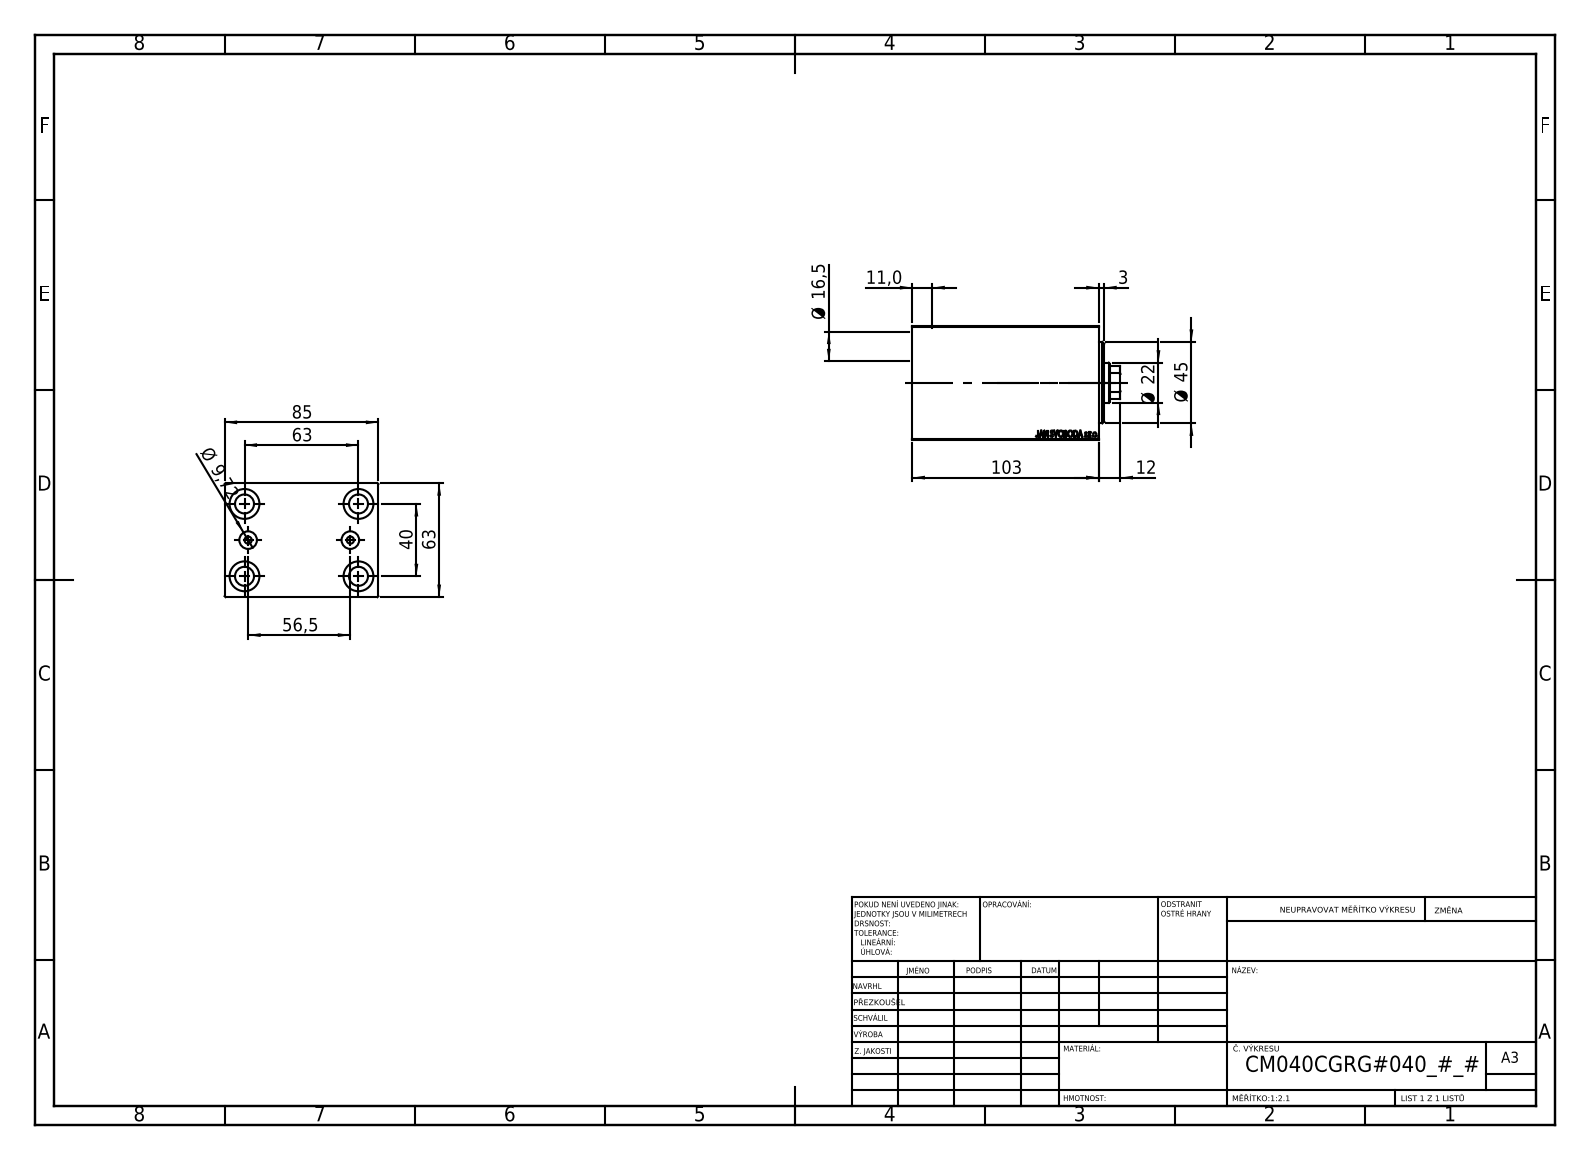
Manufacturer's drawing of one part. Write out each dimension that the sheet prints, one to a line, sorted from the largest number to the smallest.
103
85
63
63
56,5
Ø 45
40
Ø 22
Ø 16,5
12
11,0
Ø 9,72
3
